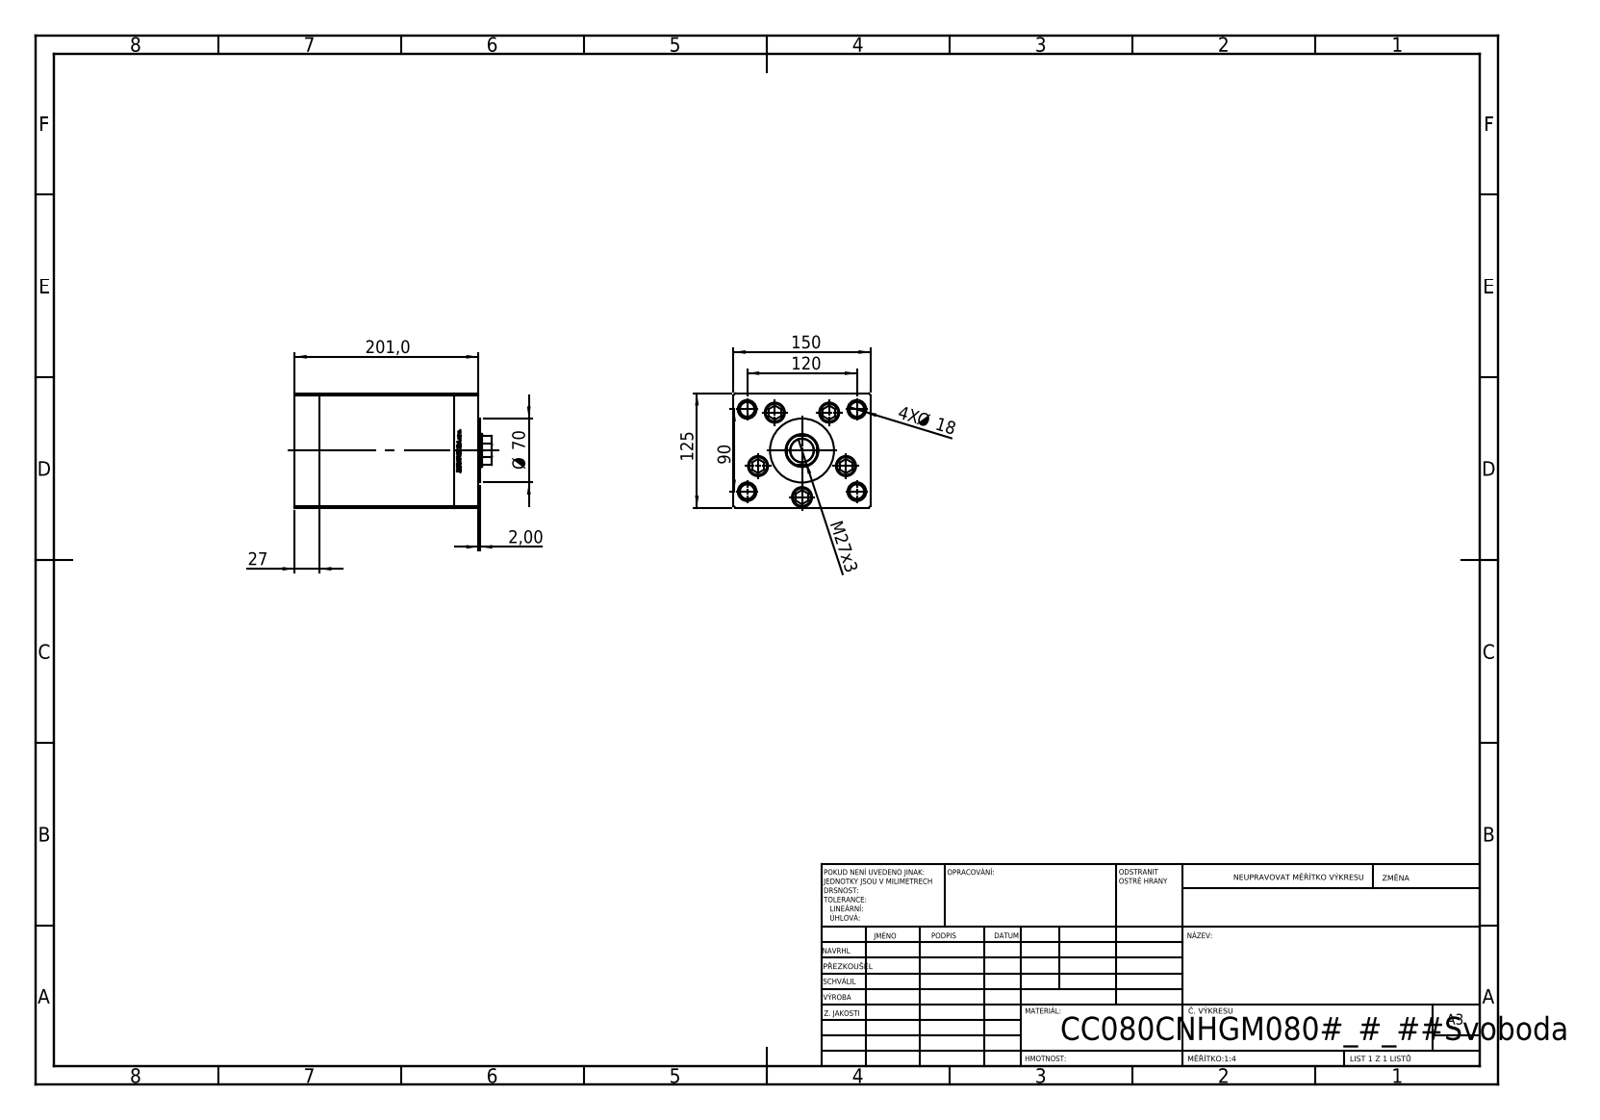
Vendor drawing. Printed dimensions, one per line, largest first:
201,0
150
125
120
90
Ø 70
27
M27x3
4X Ø 18
2,00
